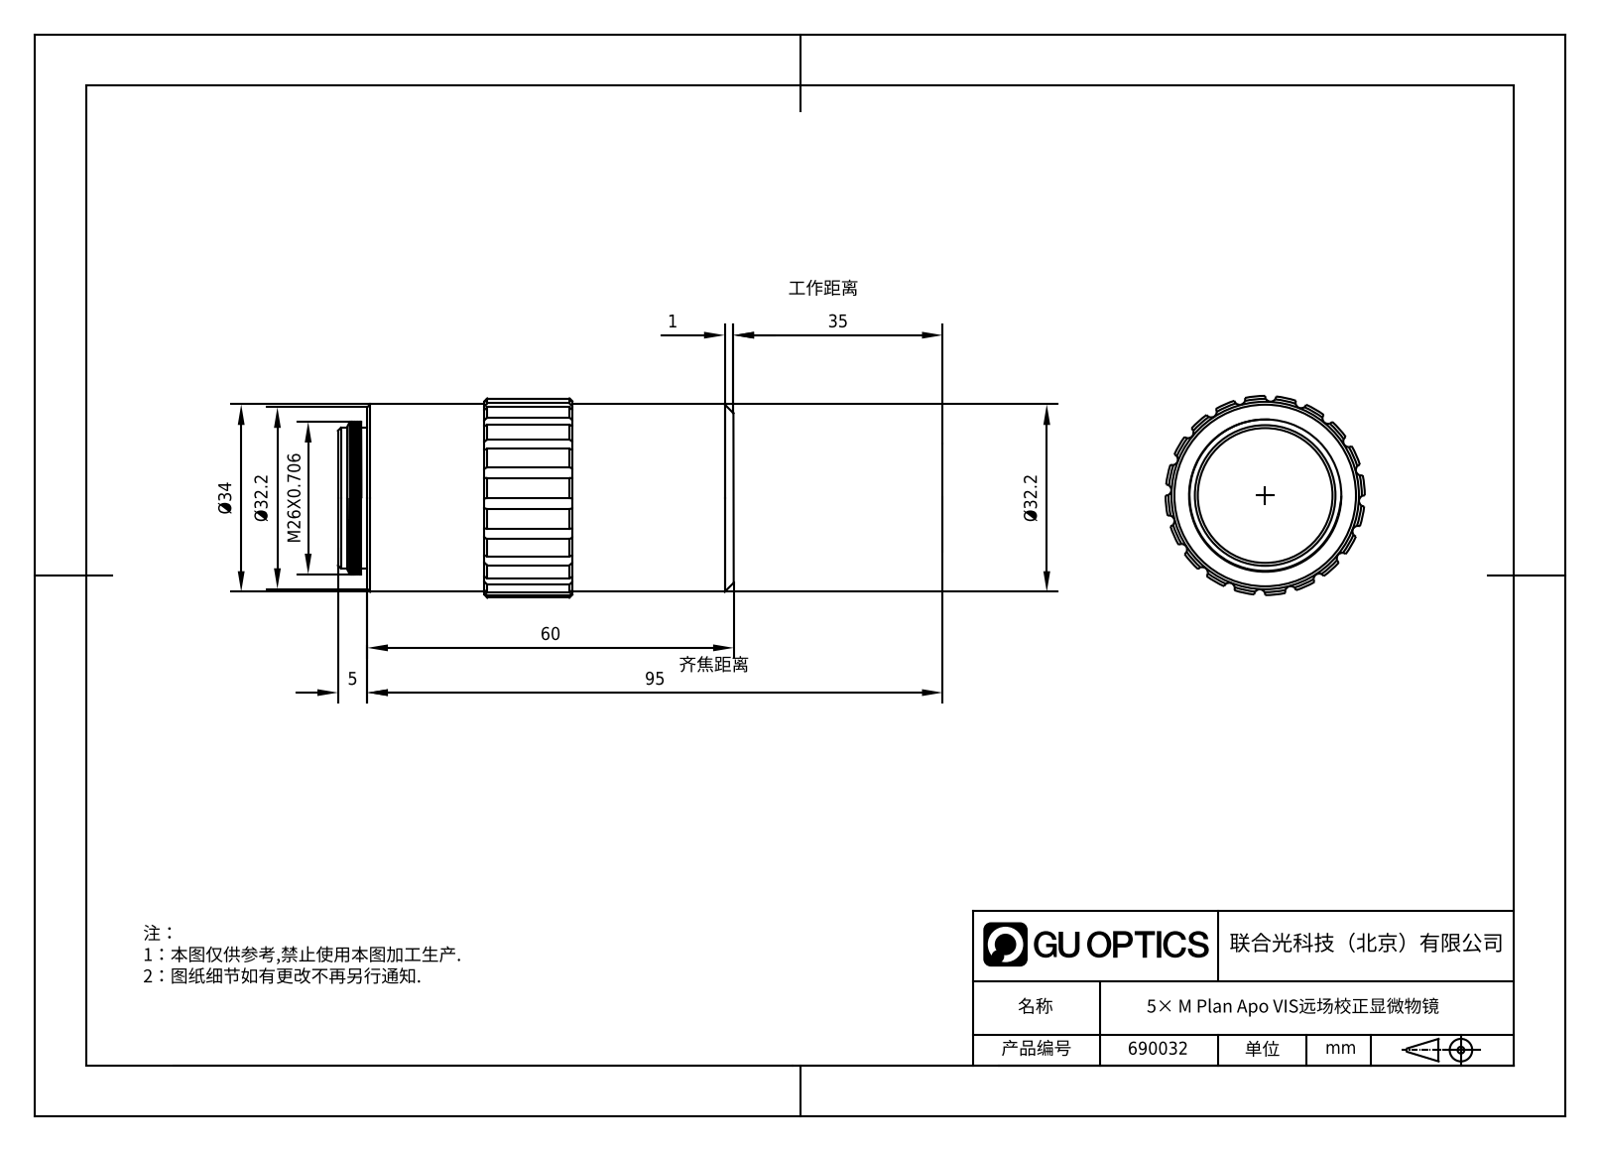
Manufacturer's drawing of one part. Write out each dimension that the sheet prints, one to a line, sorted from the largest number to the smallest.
95
60
35
Ø34
Ø32.2
Ø32.2
M26X0.706
5
1
